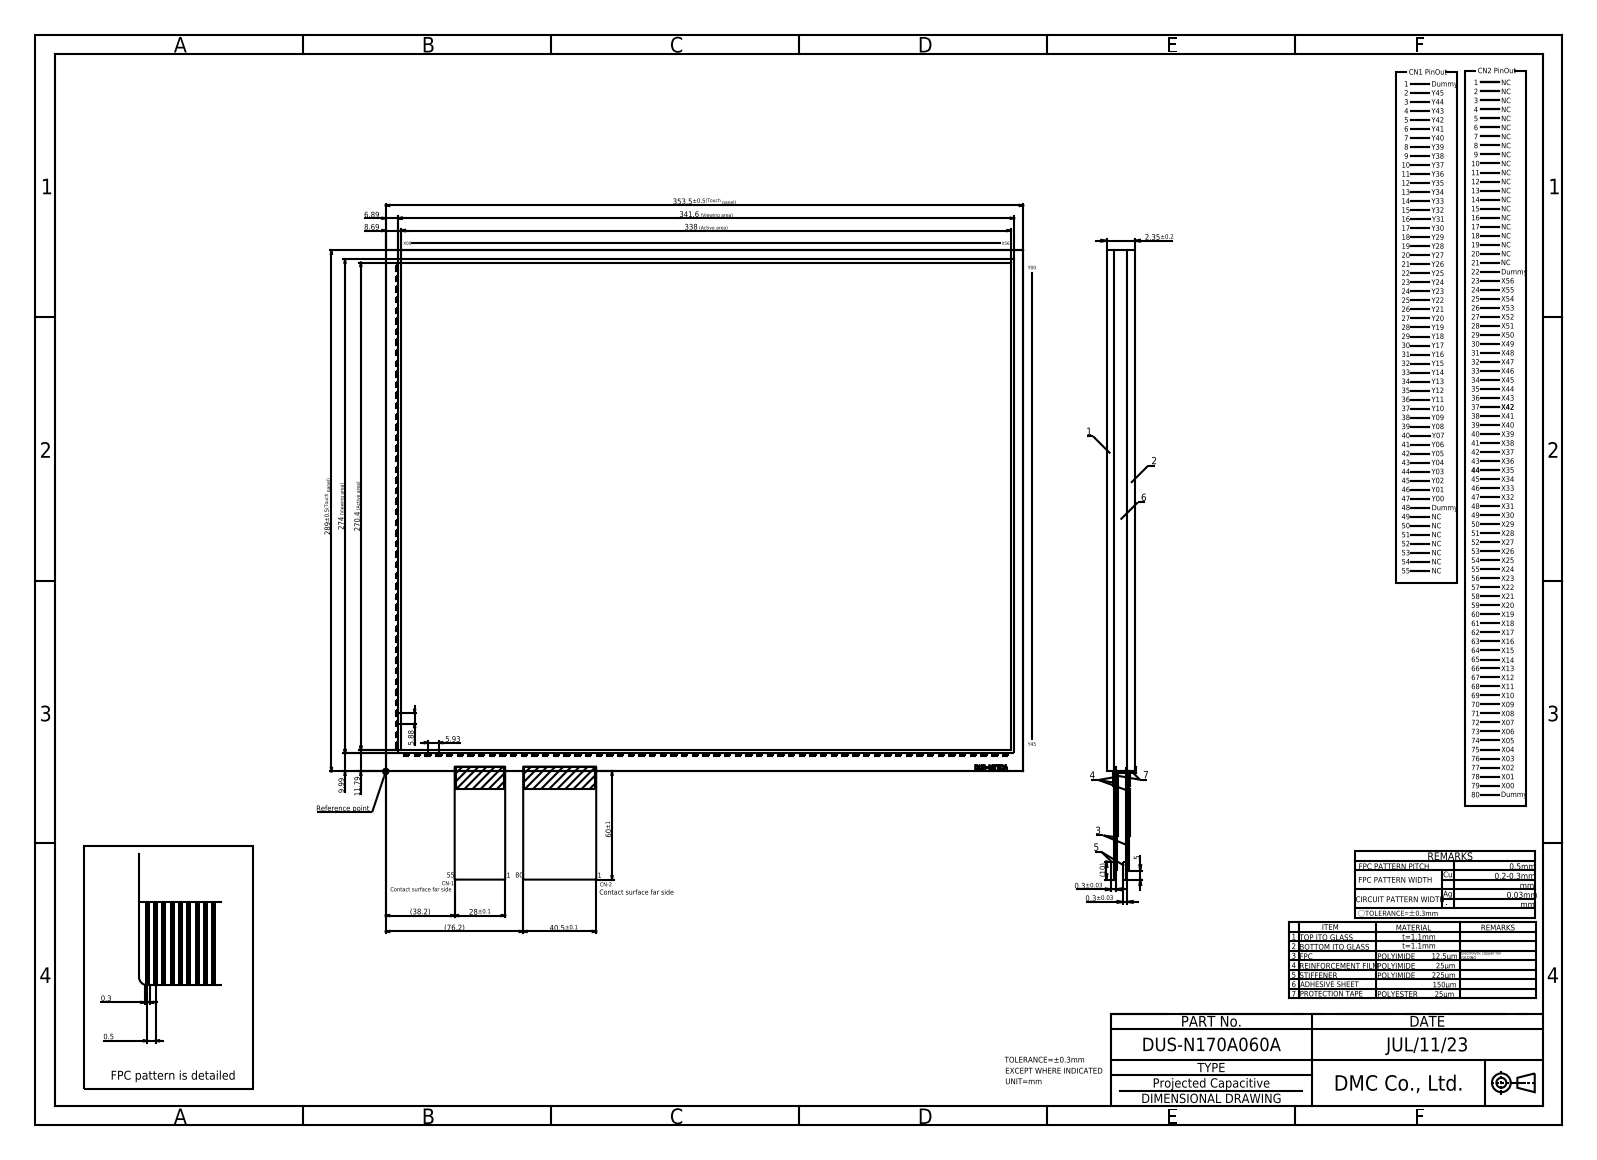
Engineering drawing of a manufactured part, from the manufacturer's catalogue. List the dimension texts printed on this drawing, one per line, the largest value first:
353.5±0.5(Touch panel)
341.6 (Viewing area)
338 (Active area)
289±0.5(Touch panel)
274 (Viewing area)
270.4 (Active area)
(76.2)
60±1
40.5±0.1
(38.2)
28±0.1
11.79
(10)
9.99
8.69
6.89
5.93
5.88
5
2.35±0.2
0.5
0.3
0.3±0.03
0.3±0.03
